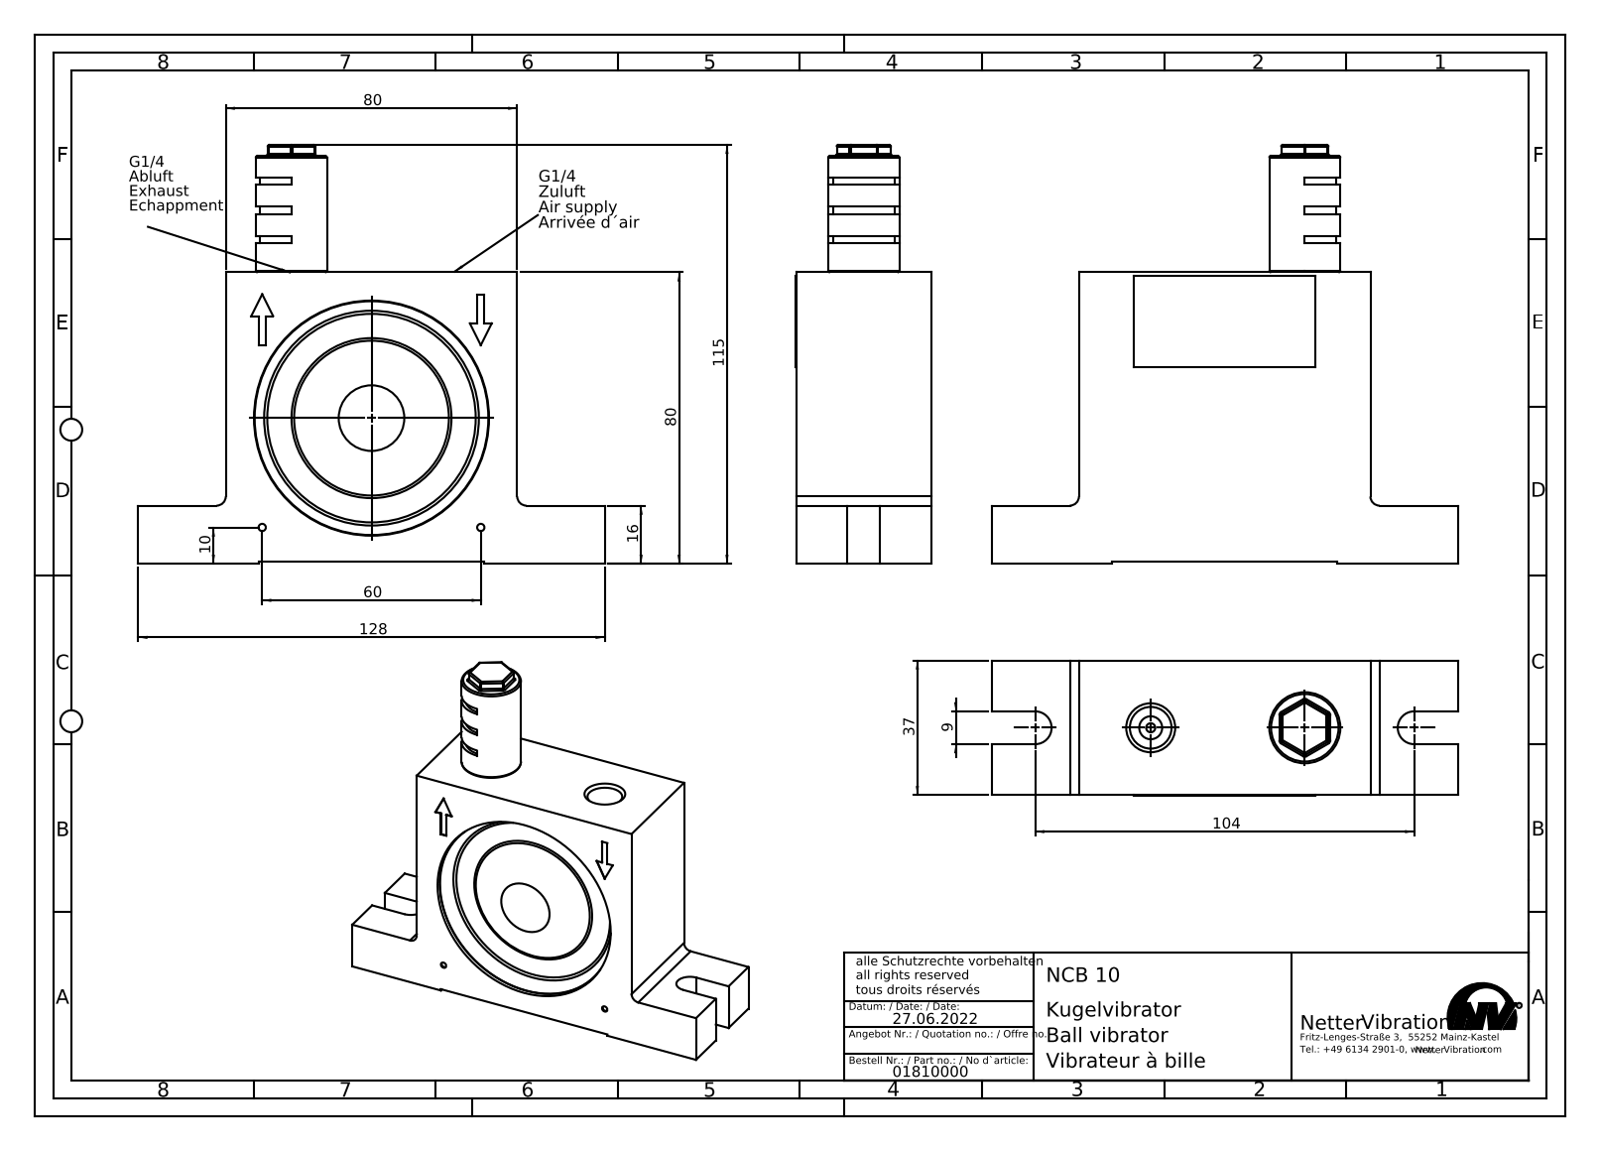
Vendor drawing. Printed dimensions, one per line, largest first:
128
115
104
80
80
60
37
16
10
9
